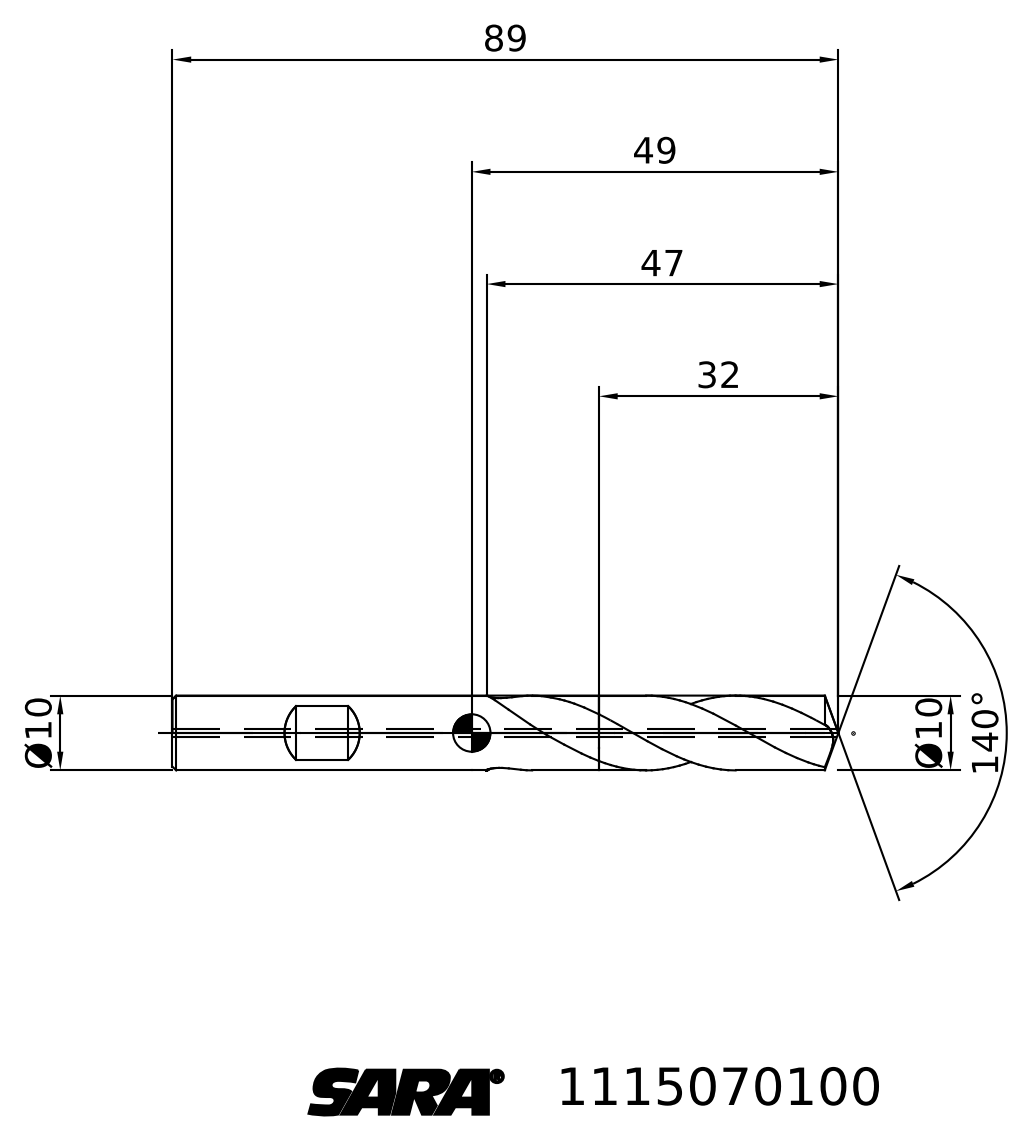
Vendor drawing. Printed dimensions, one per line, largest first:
140°
89
49
47
32
Ø10
Ø10
